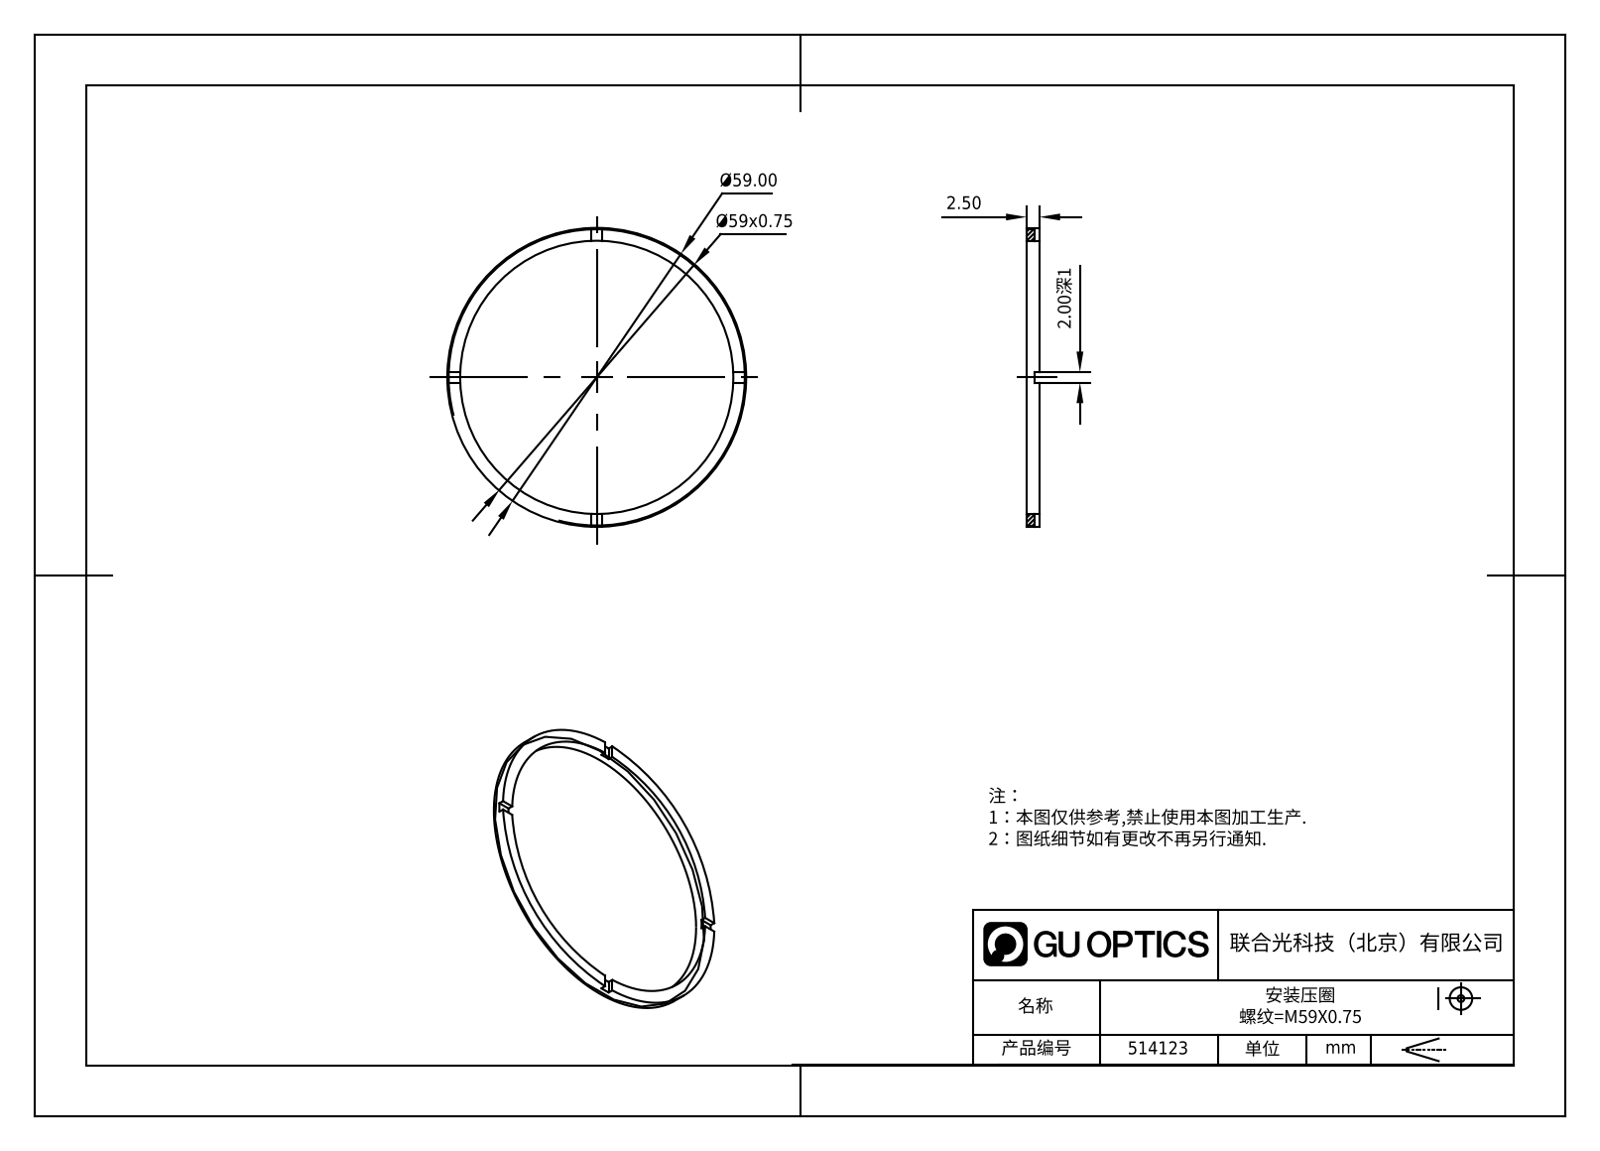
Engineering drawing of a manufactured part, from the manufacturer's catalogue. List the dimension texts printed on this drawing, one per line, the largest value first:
Ø59.00
Ø59x0.75
2.50
2.00深1
